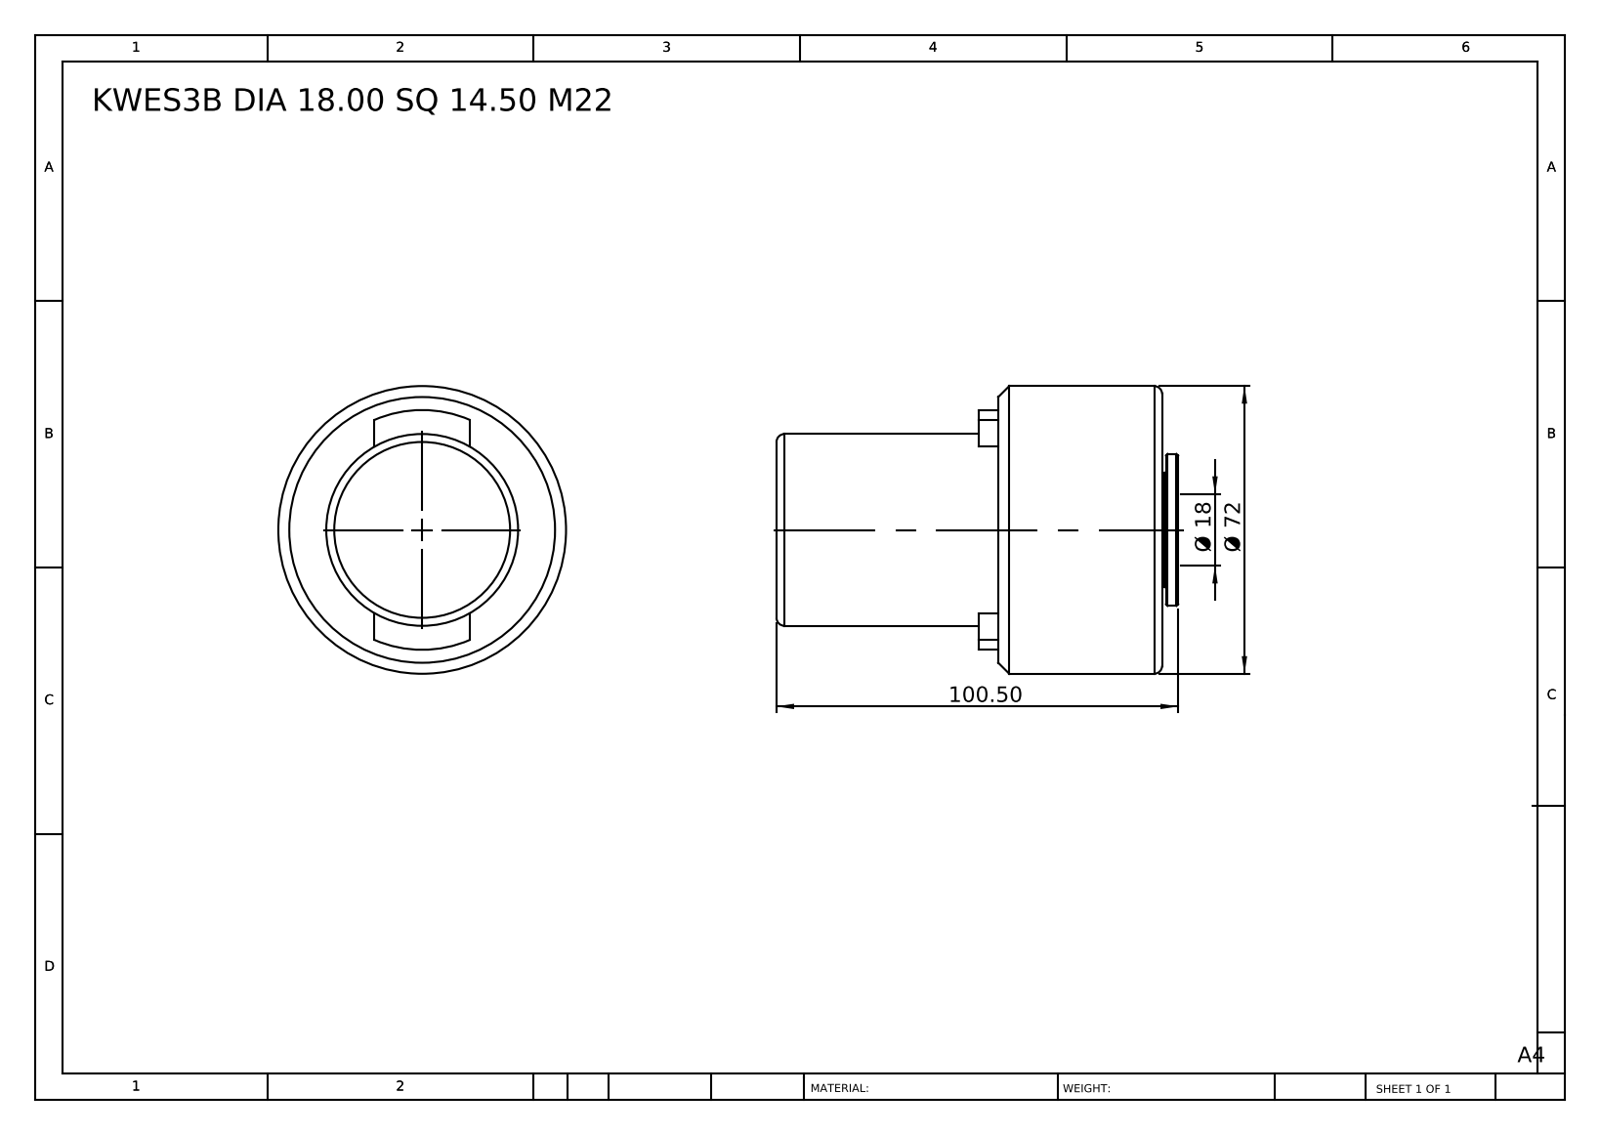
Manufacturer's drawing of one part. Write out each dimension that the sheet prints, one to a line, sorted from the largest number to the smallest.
100.50
Ø 72
Ø 18
